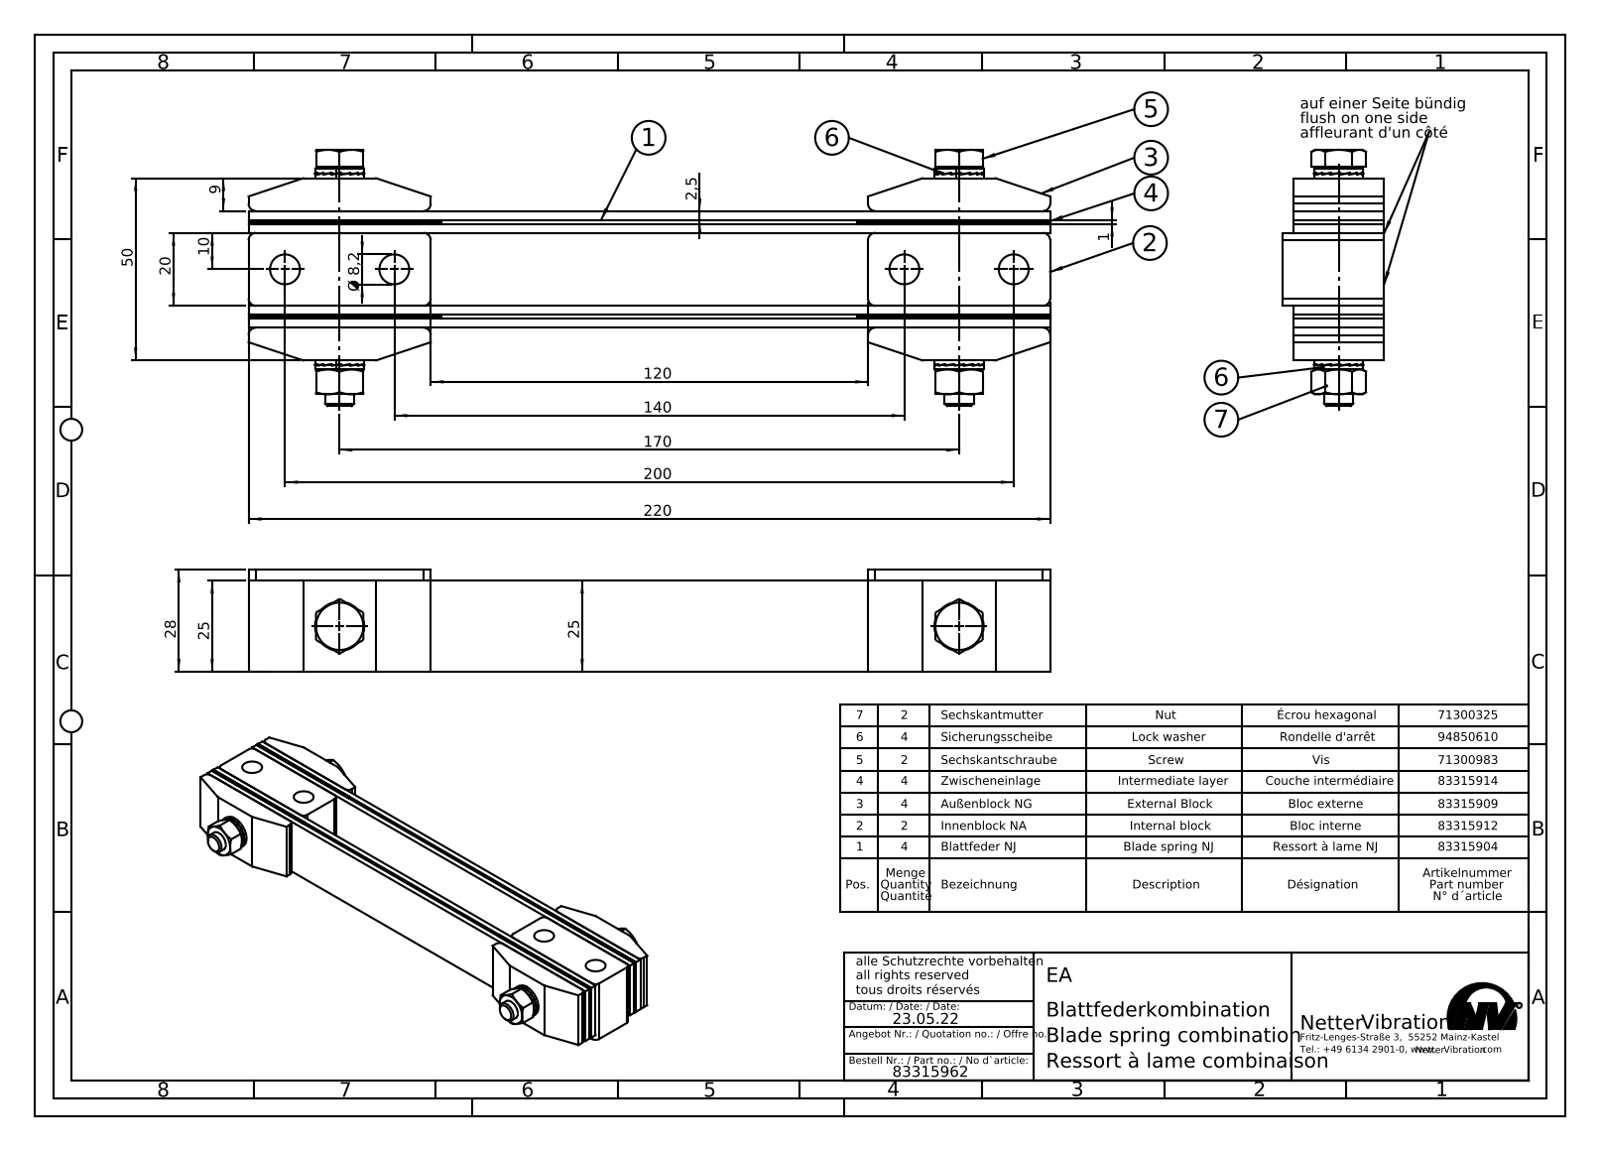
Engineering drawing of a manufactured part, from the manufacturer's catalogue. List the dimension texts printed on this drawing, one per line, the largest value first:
220
200
170
140
120
50
28
25
25
20
10
9
Ø 8,2
2,5
1
